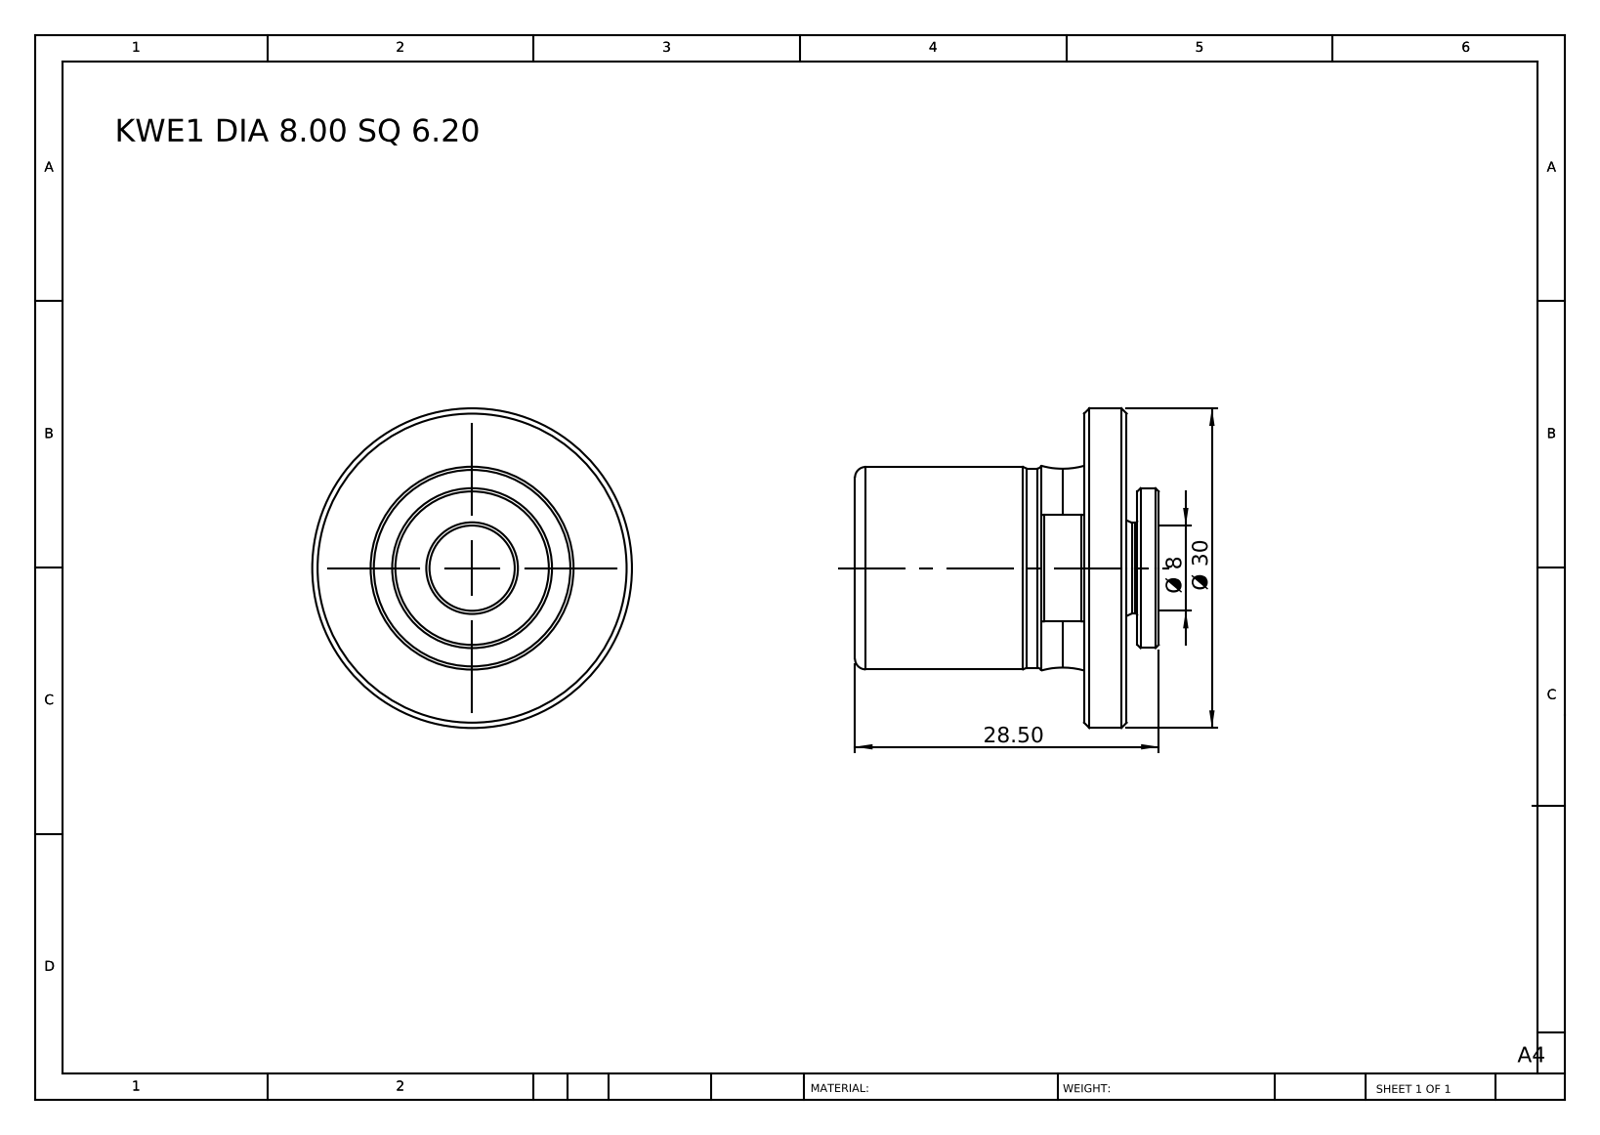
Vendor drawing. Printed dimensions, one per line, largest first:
Ø 30
28.50
Ø 8
